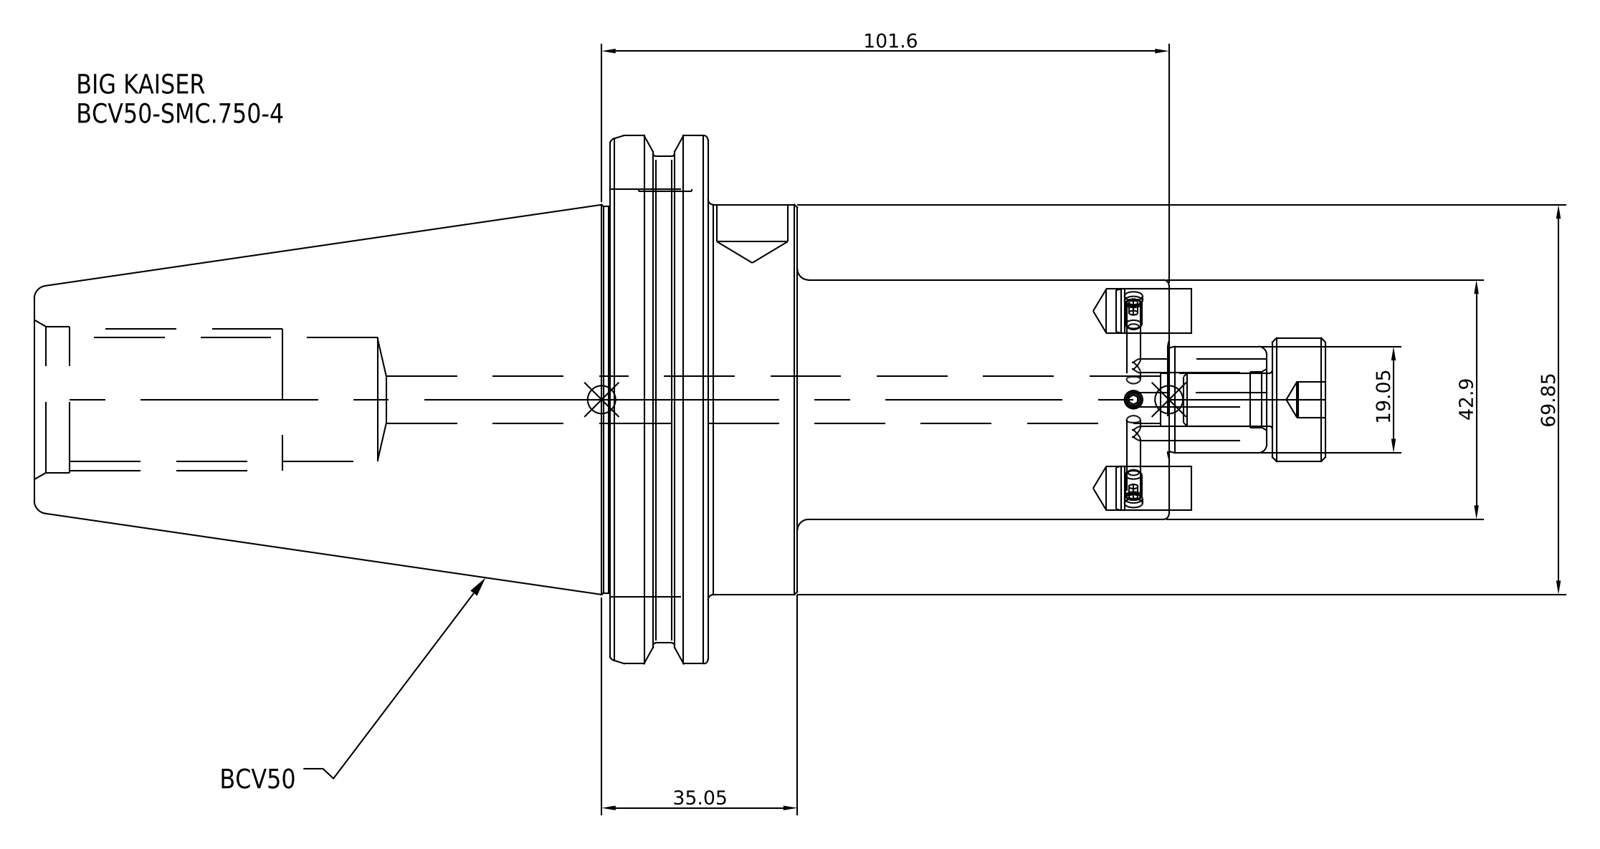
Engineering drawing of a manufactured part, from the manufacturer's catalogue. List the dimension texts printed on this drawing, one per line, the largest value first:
101.6
69.85
42.9
35.05
19.05
